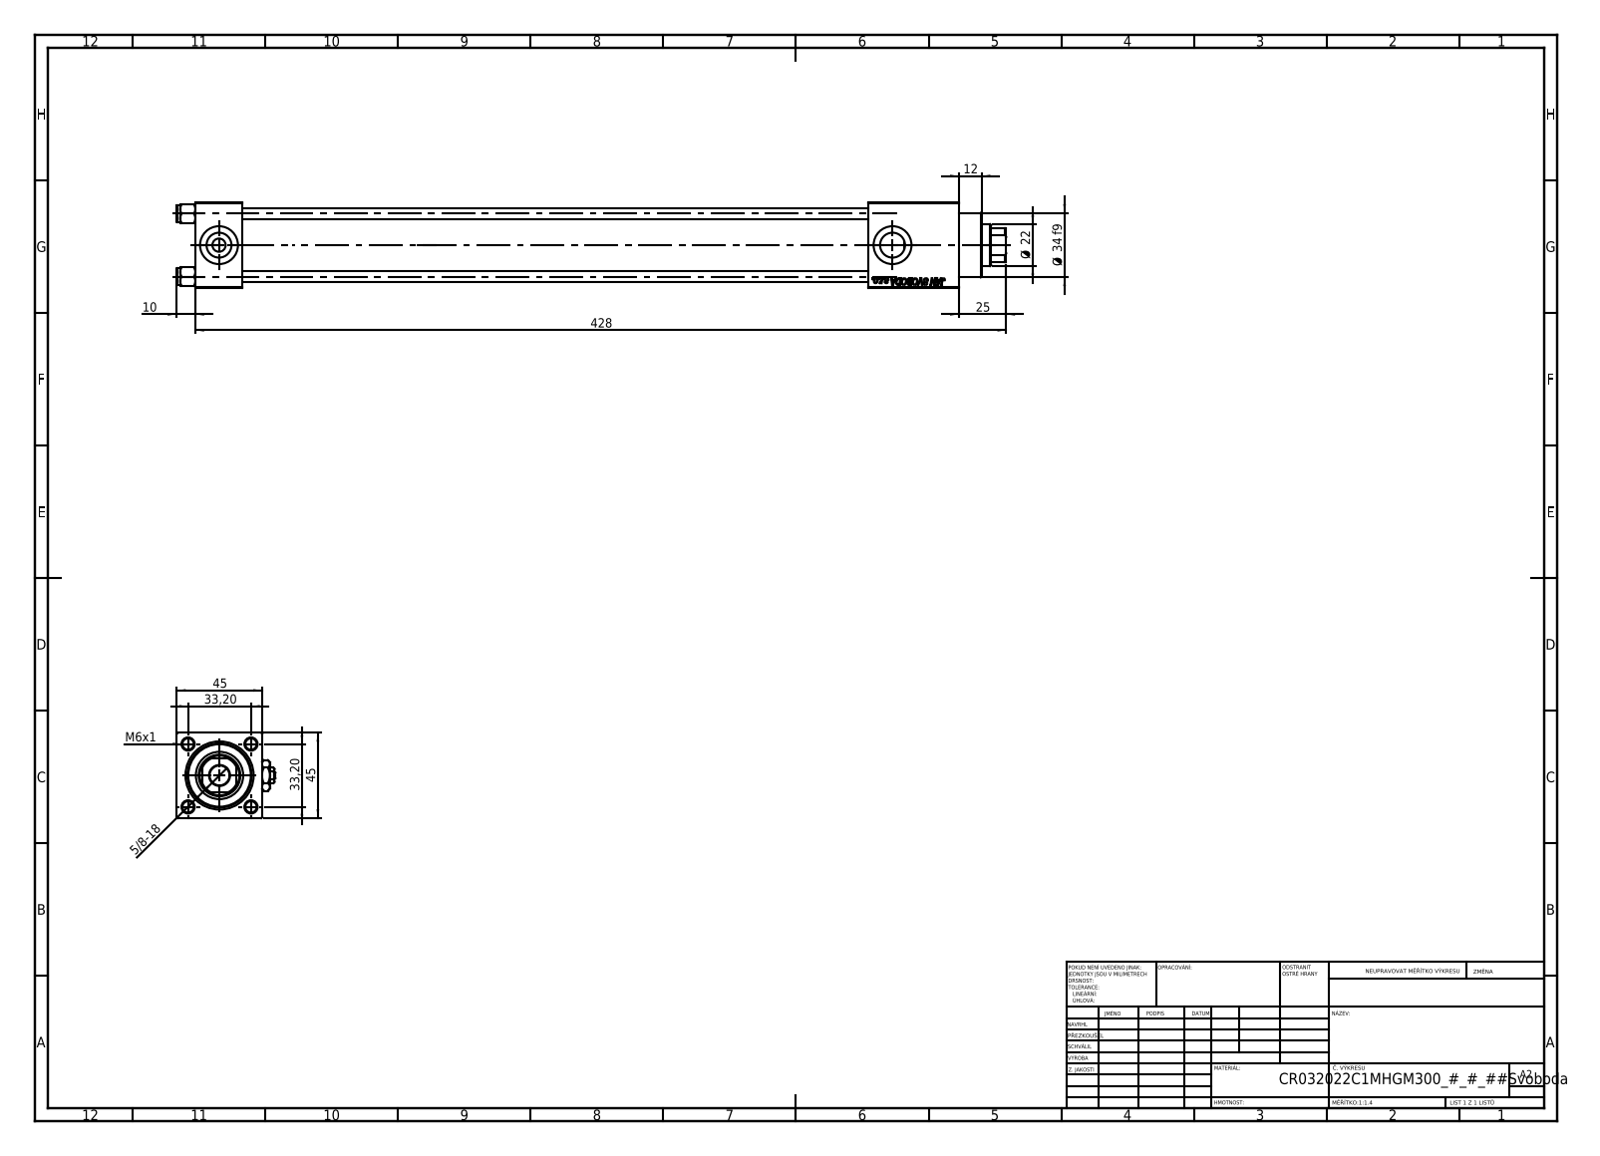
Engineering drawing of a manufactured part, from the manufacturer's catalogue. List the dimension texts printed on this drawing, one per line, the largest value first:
428
45
45
Ø 34 f9
33,20
33,20
25
Ø 22
12
10
M6x1
5/8-18
